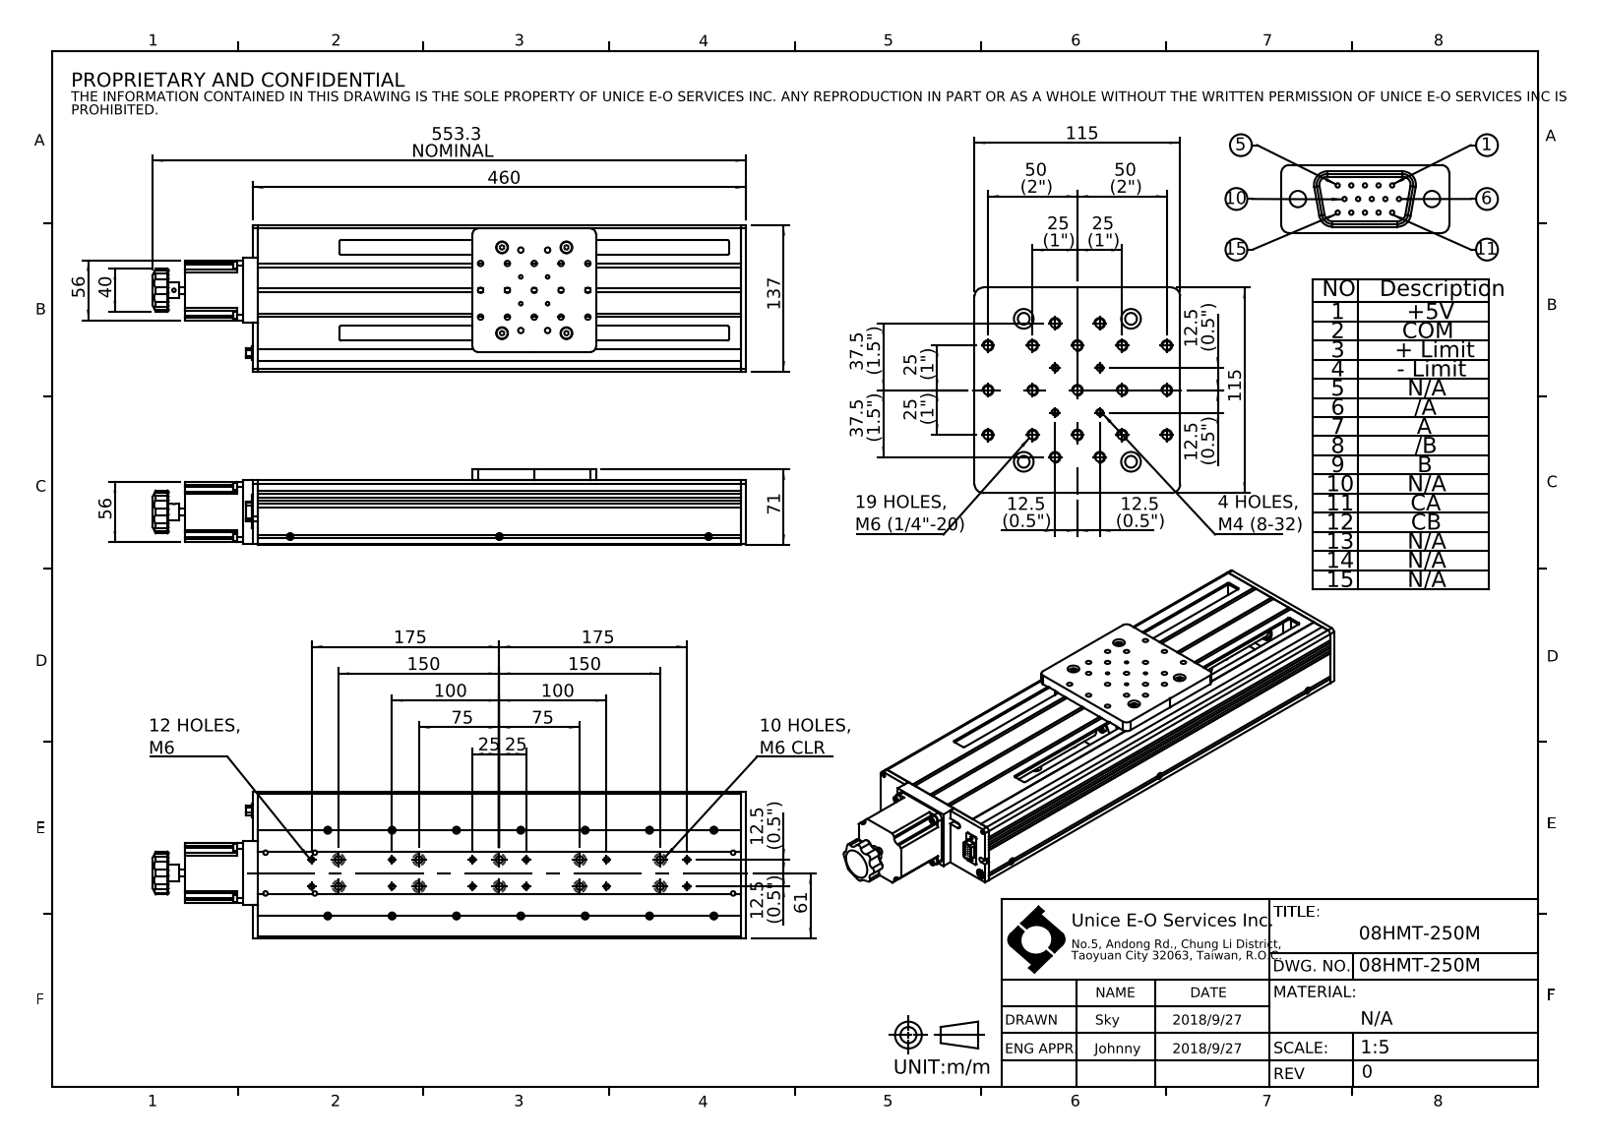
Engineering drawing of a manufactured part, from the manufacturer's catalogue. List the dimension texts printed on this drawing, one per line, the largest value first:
553.3 NOMINAL
460
175
175
150
150
137
115
115
100
100
75
75
71
61
56
56
50 (2")
50 (2")
40
37.5 (1.5")
37.5 (1.5")
25
25
25 (1")
25 (1")
25 (1")
25 (1")
12.5 (0.5")
12.5 (0.5")
12.5 (0.5")
12.5 (0.5")
12.5 (0.5")
12.5 (0.5")
